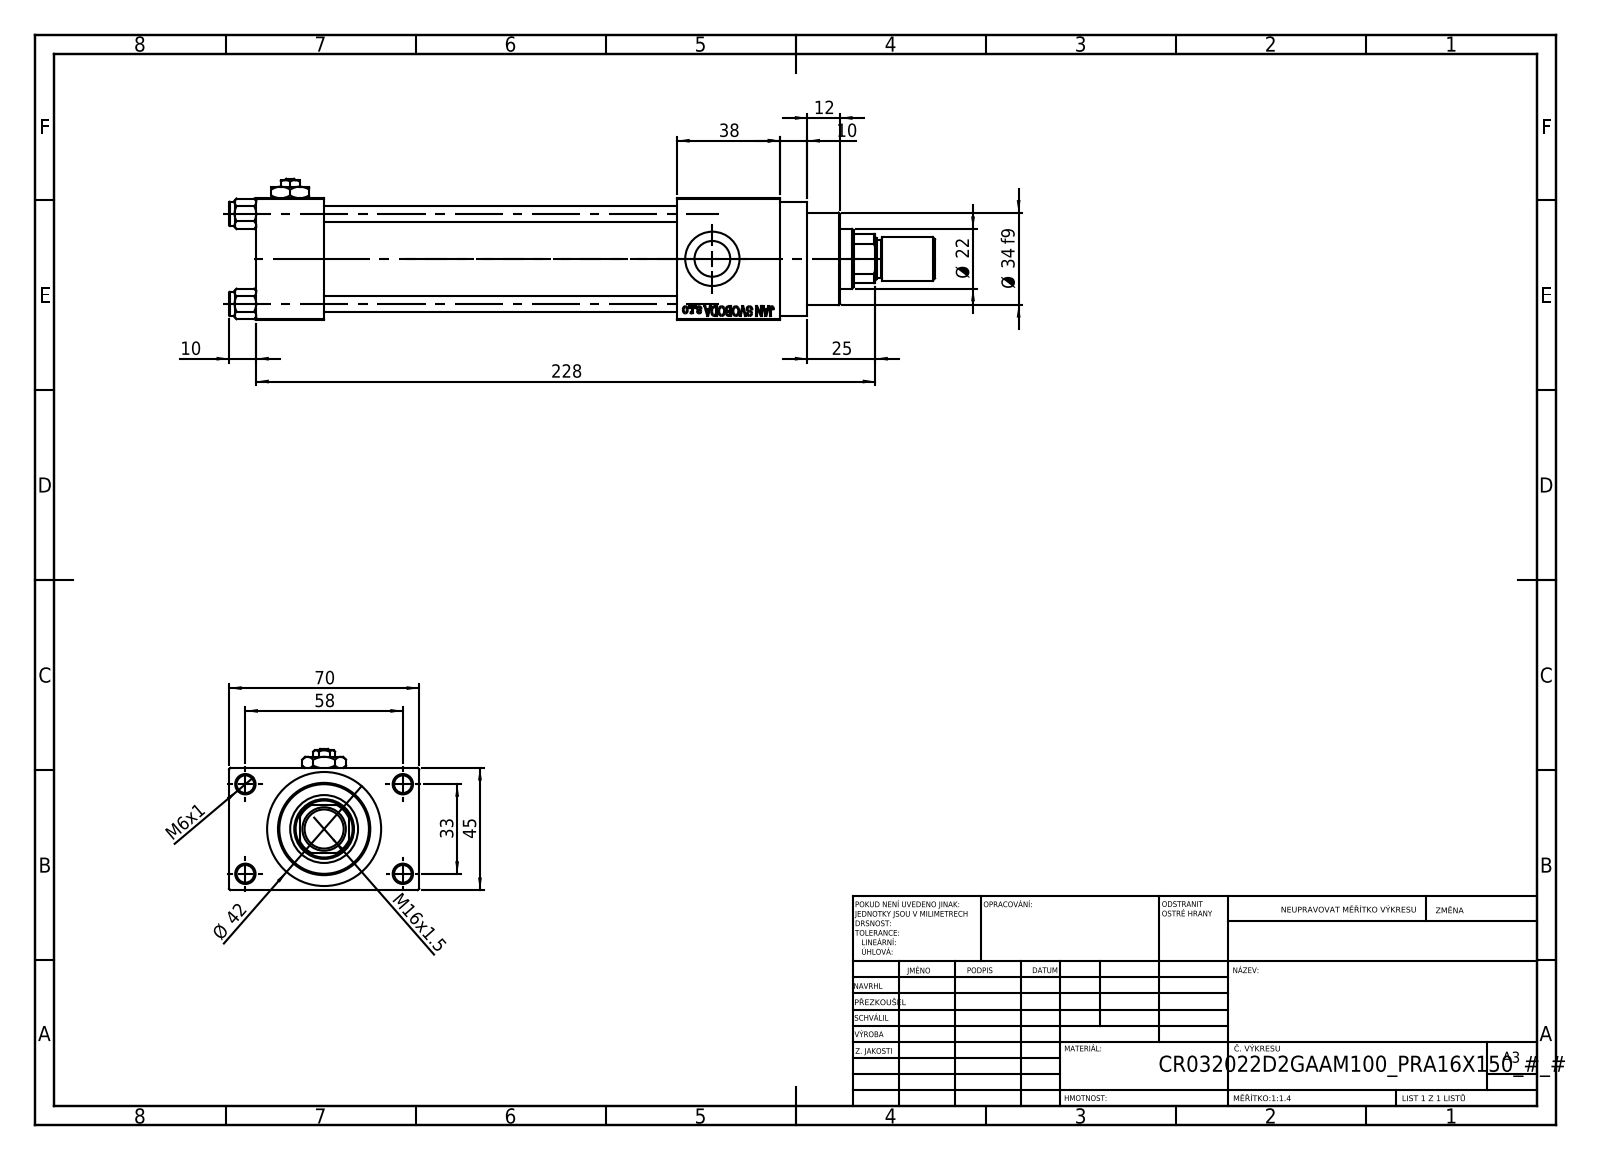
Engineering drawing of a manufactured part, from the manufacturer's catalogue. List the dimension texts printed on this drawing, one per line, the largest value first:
228
70
58
45
Ø 42
38
Ø 34 f9
33
25
Ø 22
M16x1.5
12
10
10
M6x1
